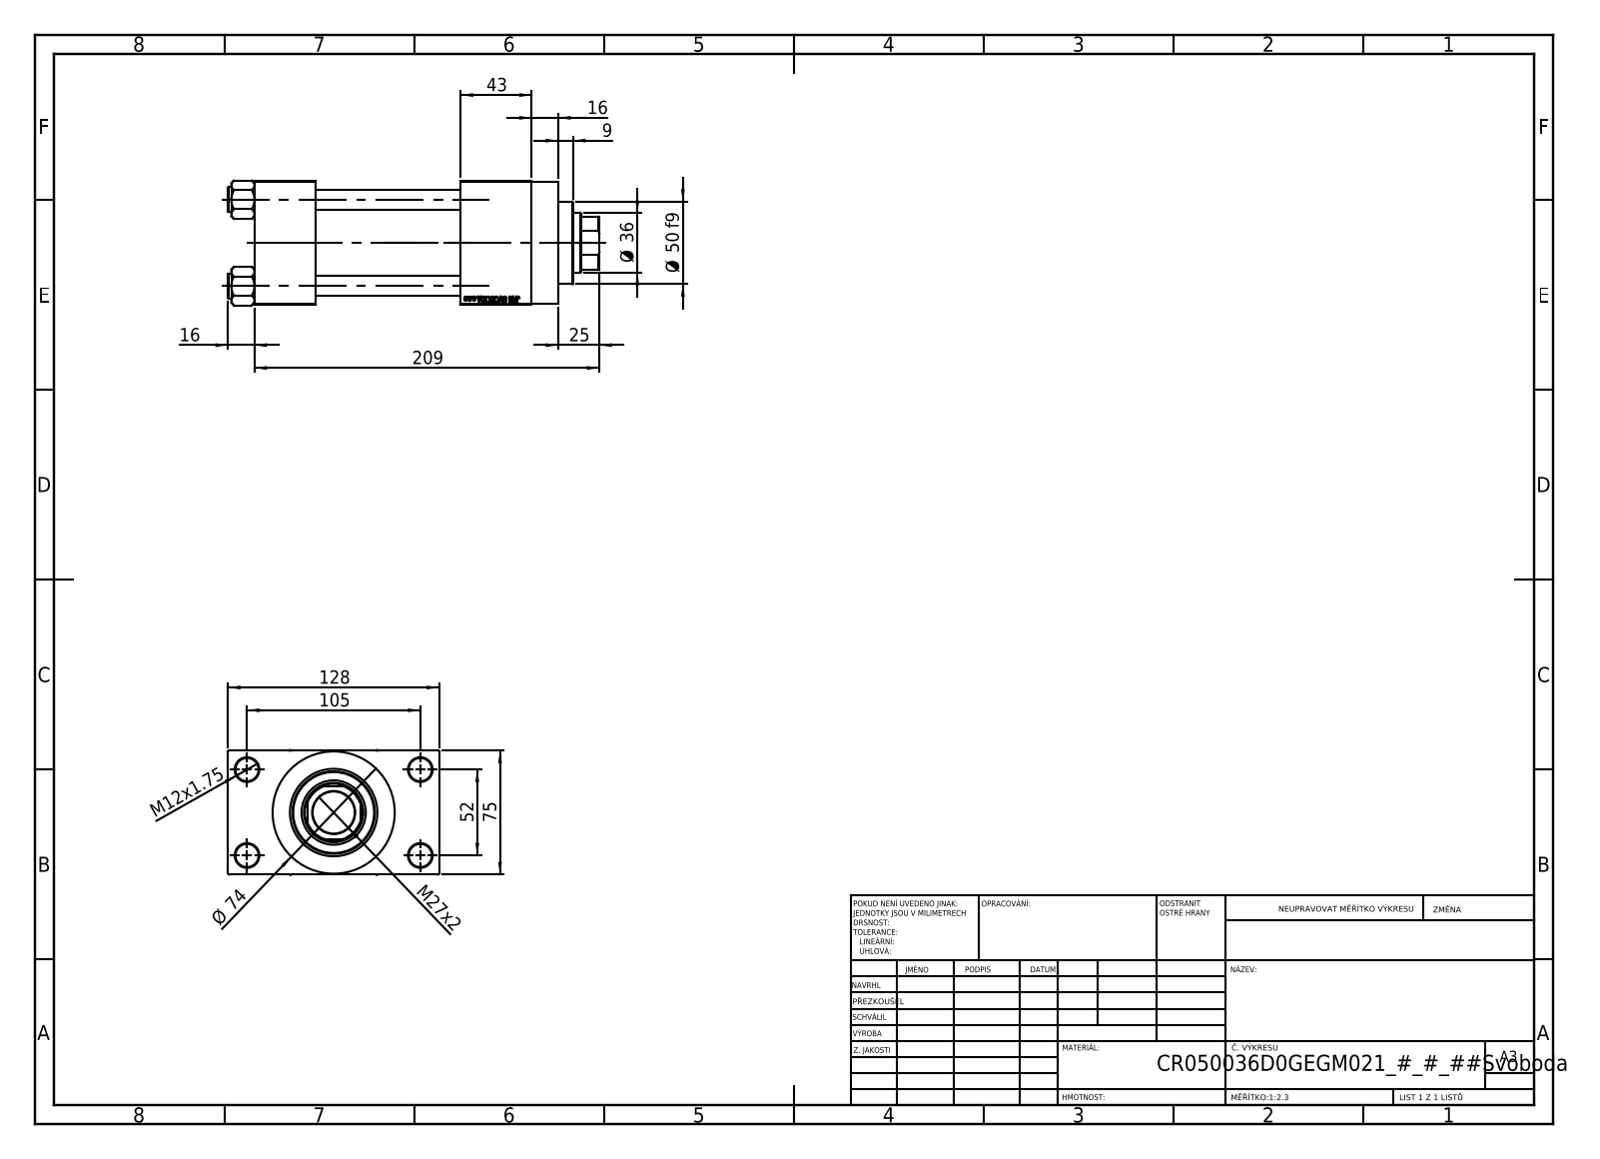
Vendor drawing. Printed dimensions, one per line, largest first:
209
128
105
75
Ø 74
52
Ø 50 f9
43
Ø 36
M27x2
25
16
16
M12x1.75
9
